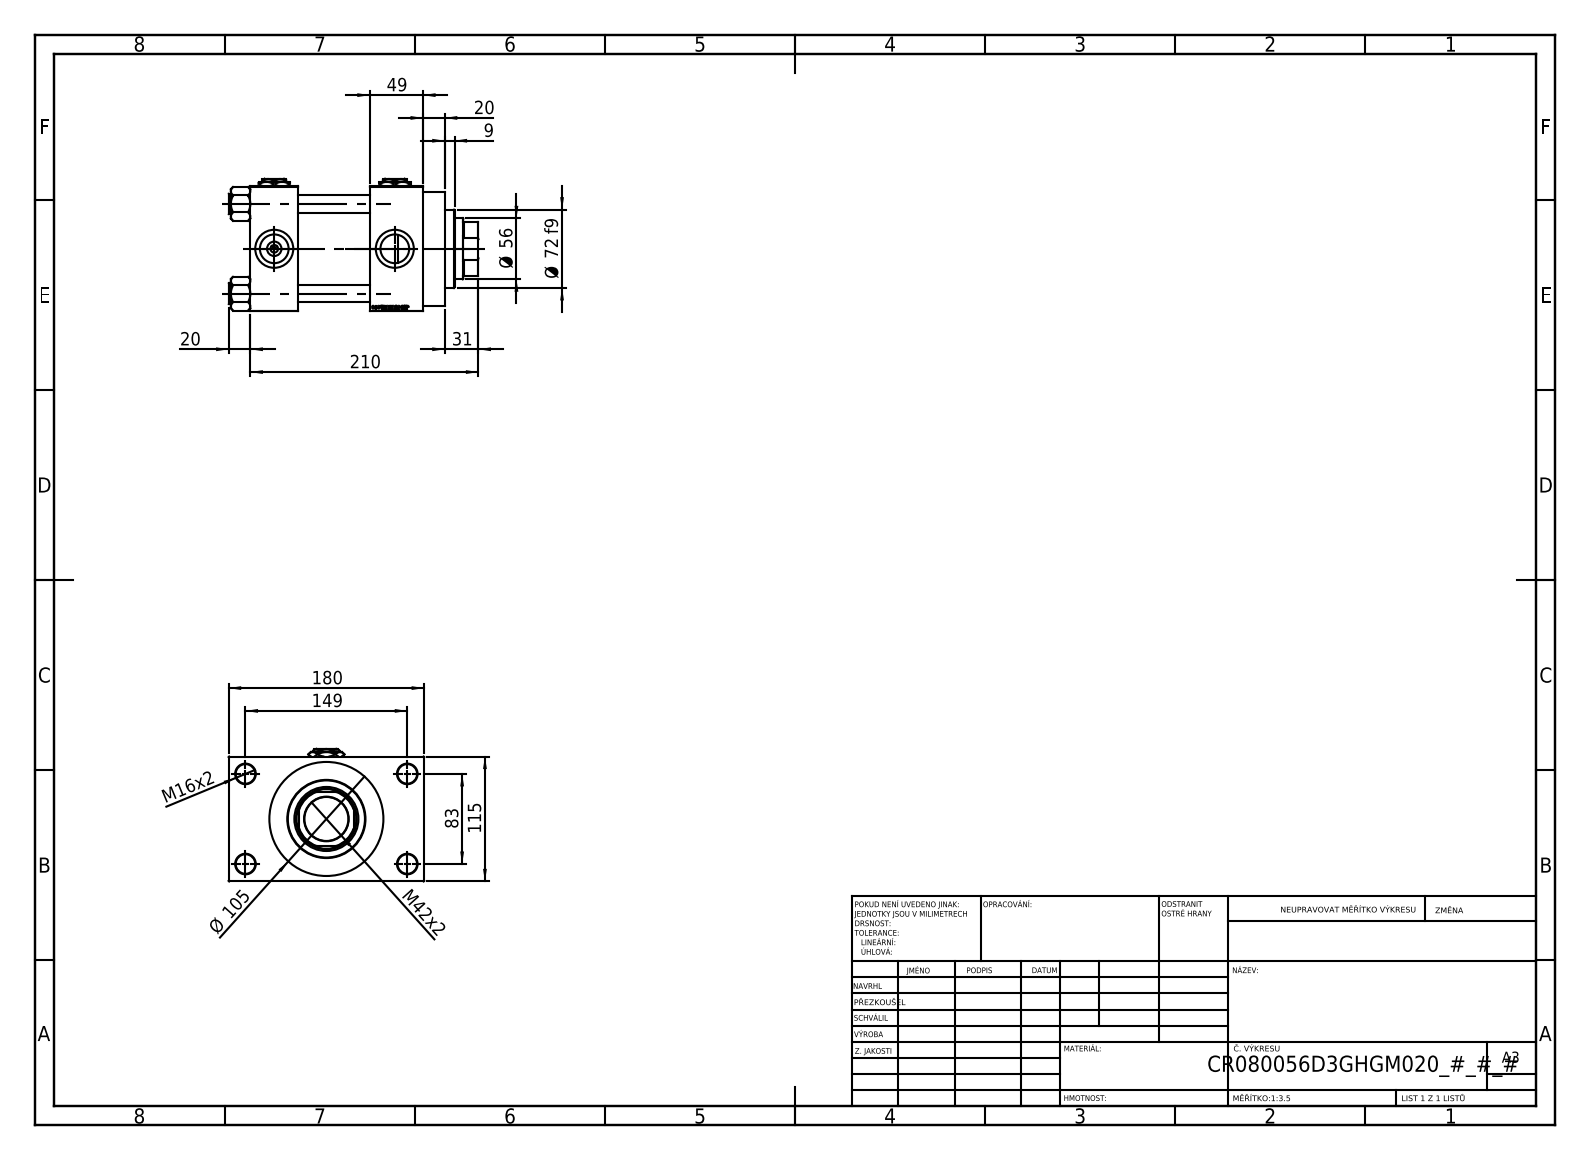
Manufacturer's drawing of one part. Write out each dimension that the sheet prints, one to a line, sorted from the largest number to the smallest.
210
180
149
115
Ø 105
83
Ø 72 f9
Ø 56
49
M42x2
31
20
20
M16x2
9
